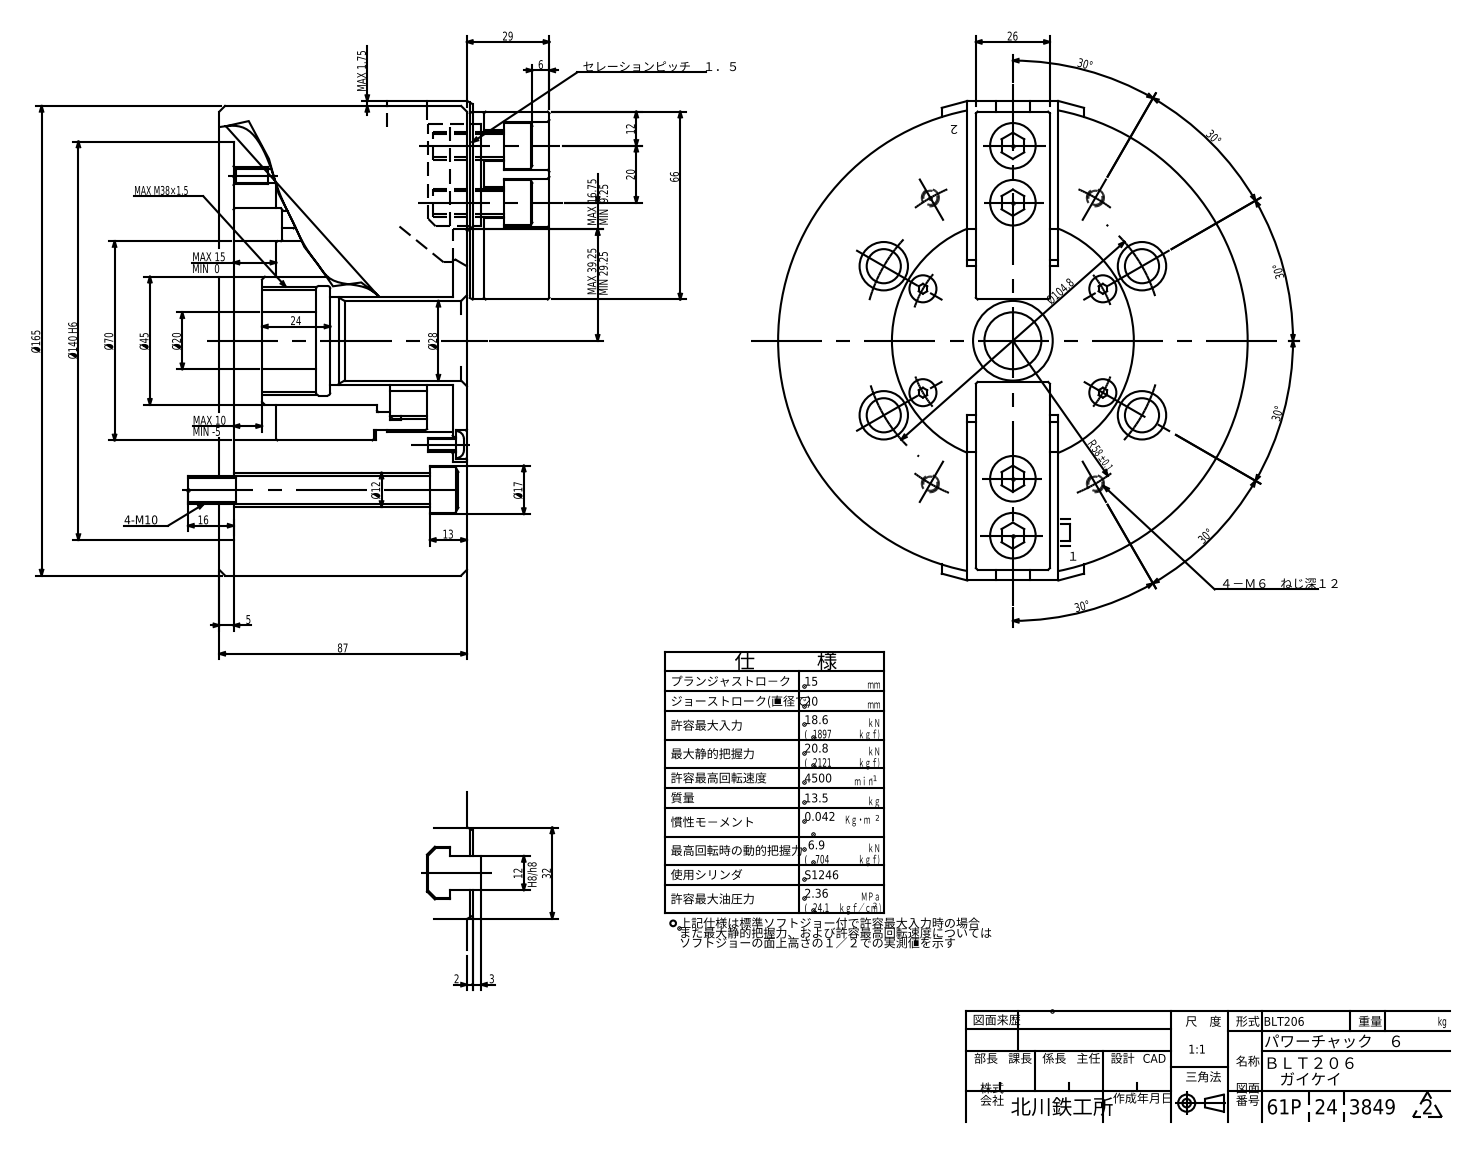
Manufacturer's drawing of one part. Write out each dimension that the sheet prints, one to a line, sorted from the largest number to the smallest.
Ø165
Ø140 H6
Ø104.8
87
Ø70
66
Ｒ58 ±0.1
Ø45
MAX 39.25
32
30°
30°
30°
30°
30°
30°
29
Ø28
26
24
Ø20
20
Ø17
MAX 16.75
16
MAX 15
13
12
12
Ø12
MAX 10
6
5
3
2
MAX 1.75
